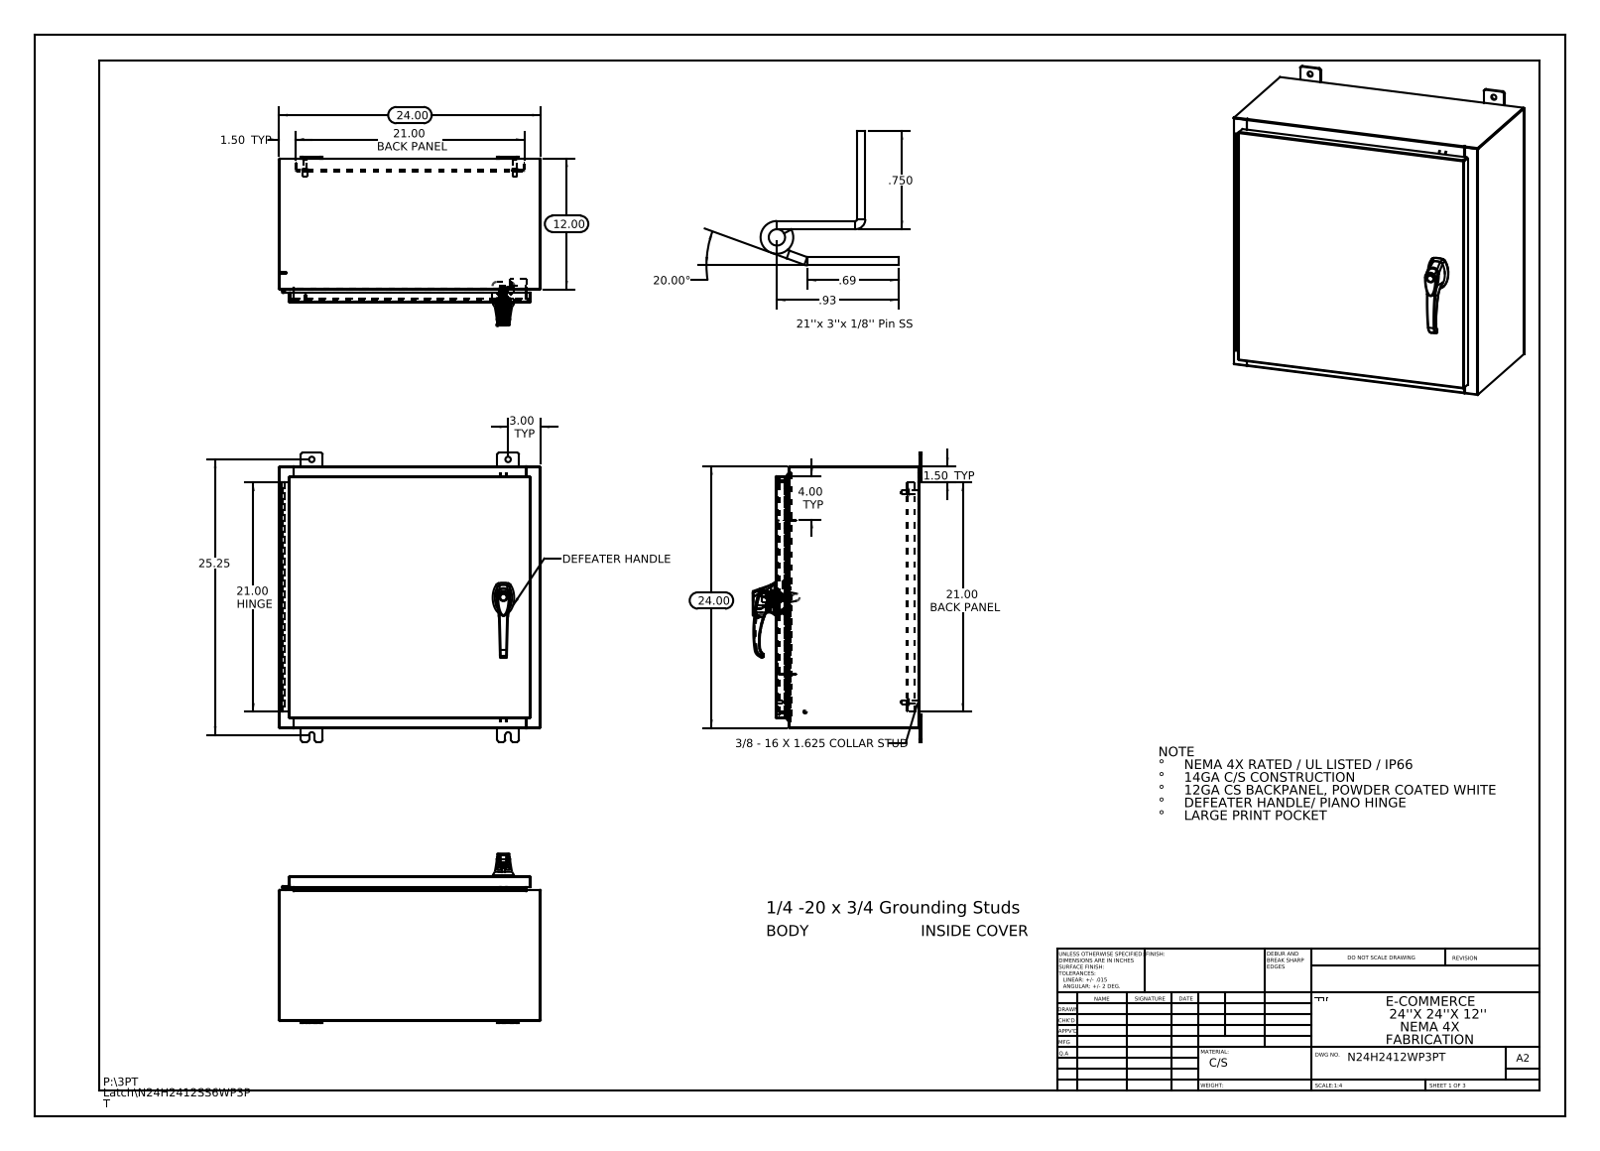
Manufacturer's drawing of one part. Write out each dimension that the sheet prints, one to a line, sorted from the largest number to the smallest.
25.25
24.00
24.00
21.00 HINGE
21.00 BACK PANEL
21.00 BACK PANEL
20.00°
12.00
4.00 TYP
3.00 TYP
1.50 TYP
1.50 TYP
.93
.750
.69
